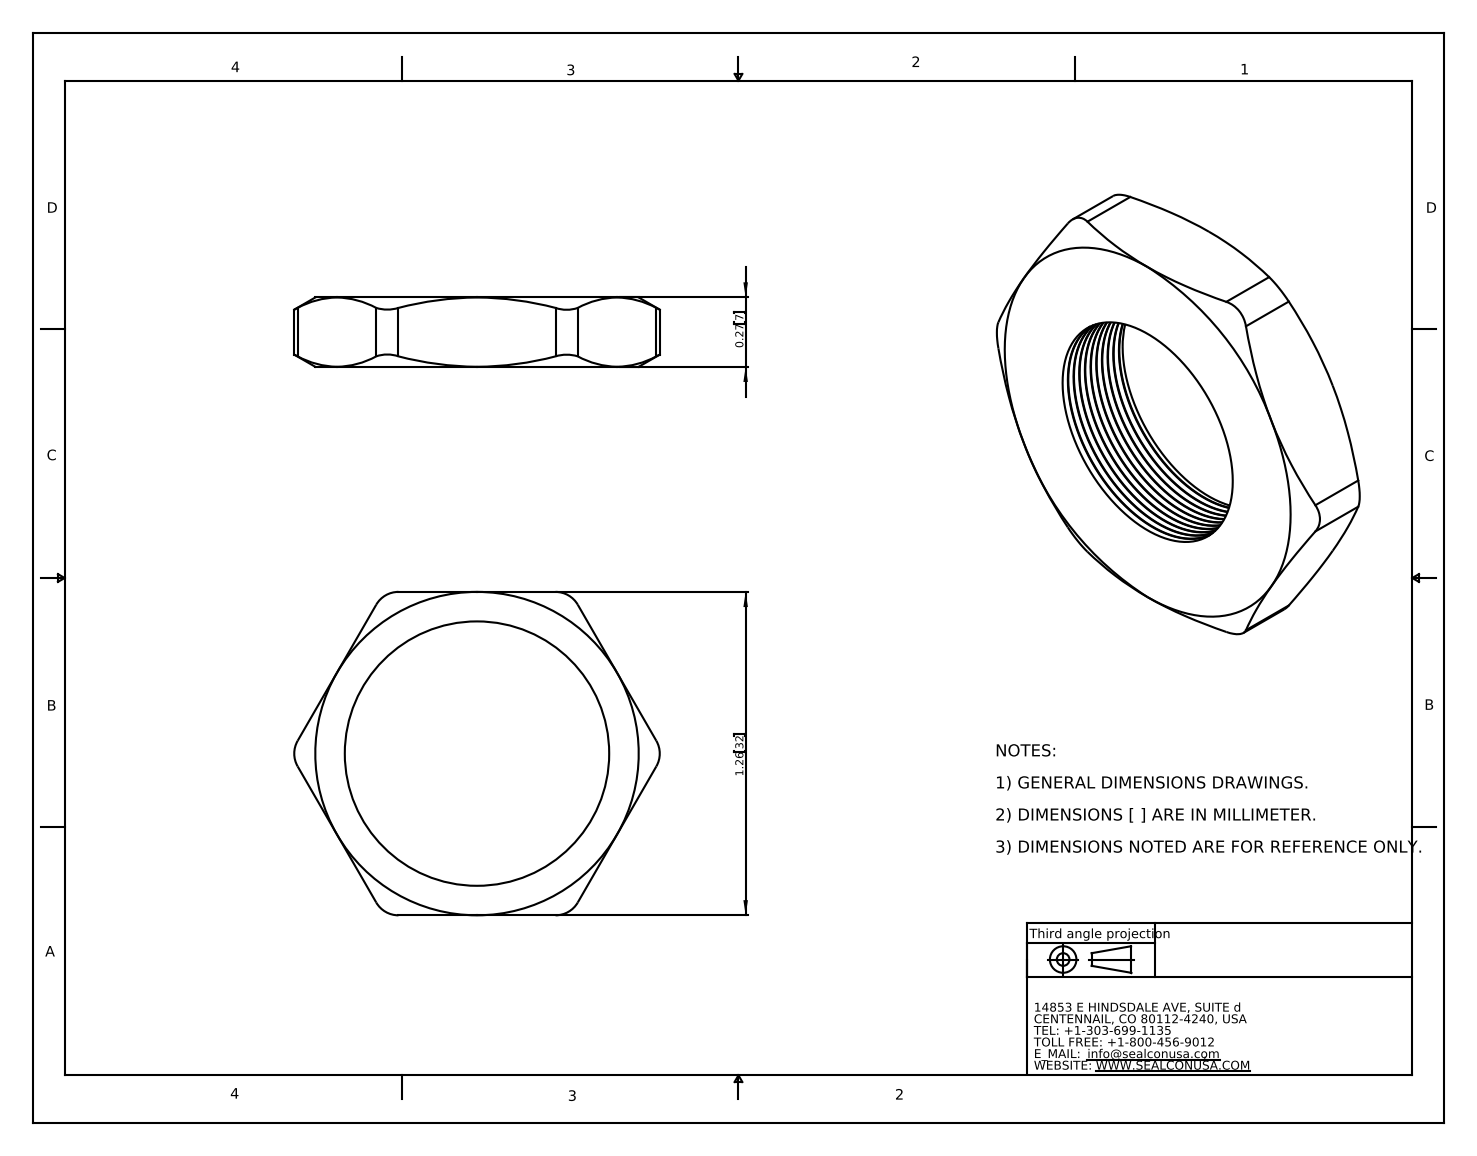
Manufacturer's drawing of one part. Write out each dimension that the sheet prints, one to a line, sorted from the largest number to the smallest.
1.26 32
0.27 7
